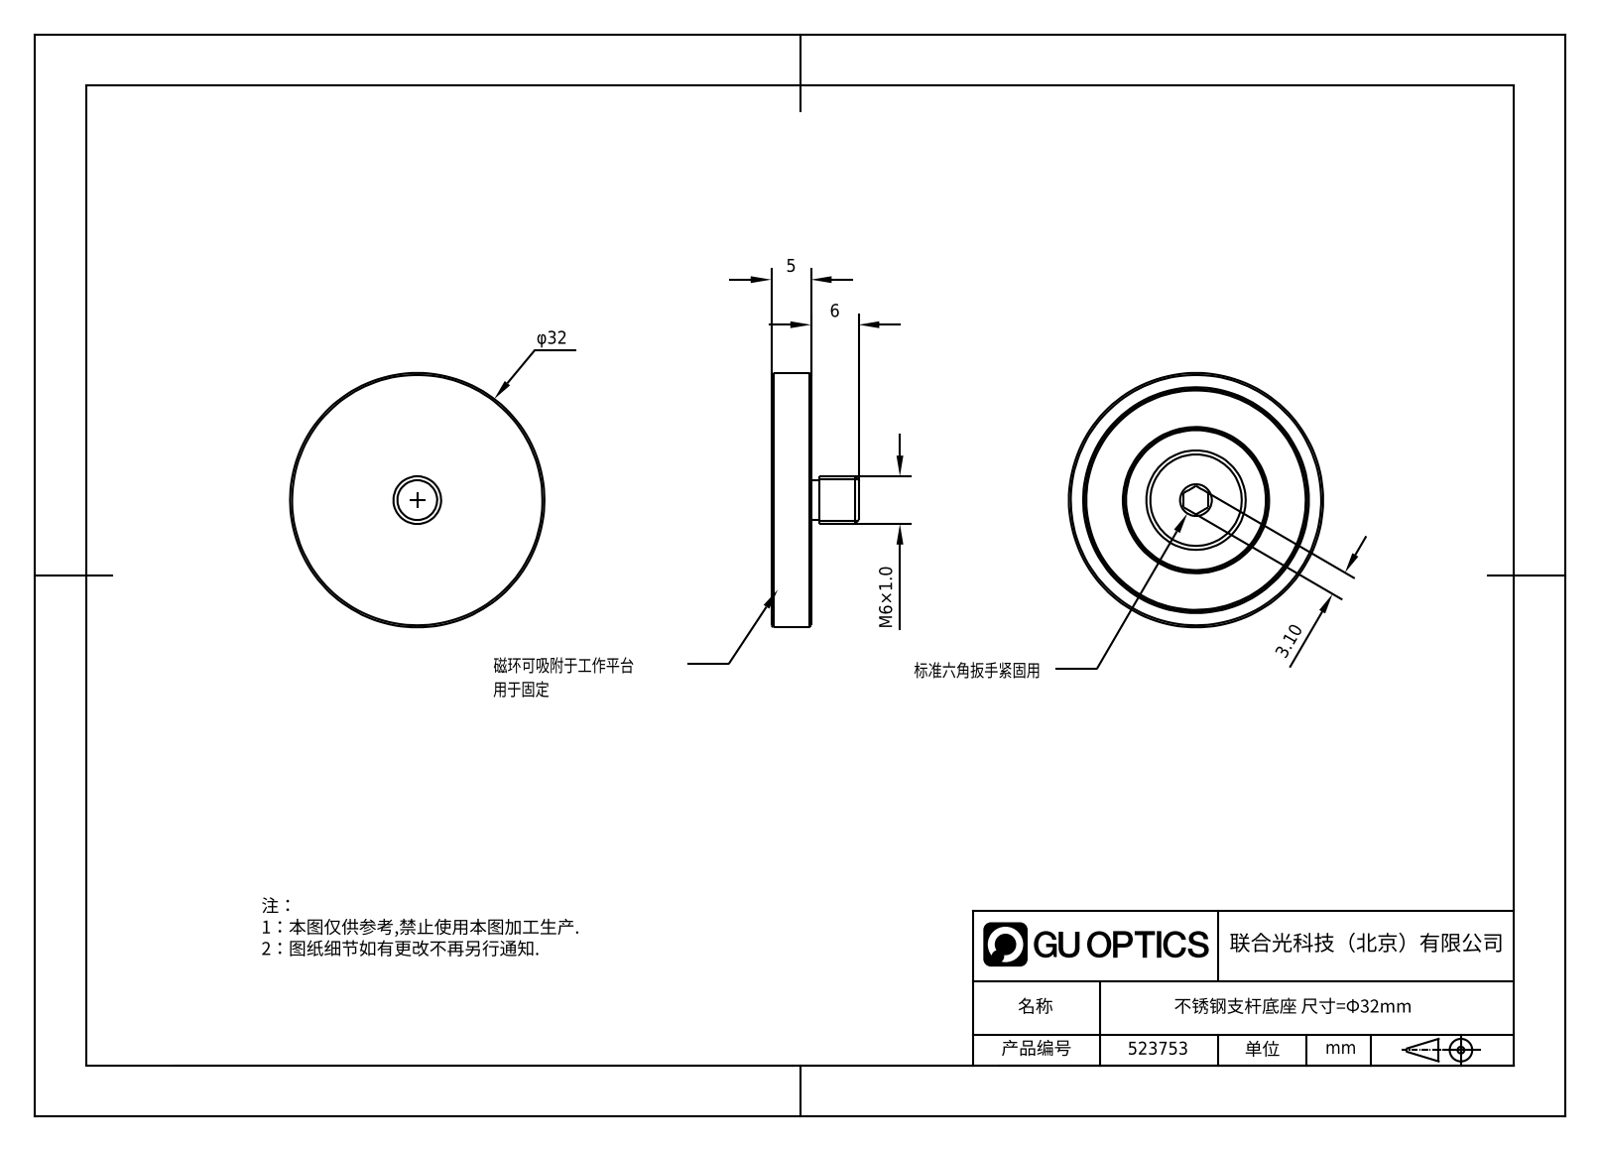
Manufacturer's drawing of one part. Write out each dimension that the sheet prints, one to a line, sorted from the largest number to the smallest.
M6×1.0
6
5
3.10
